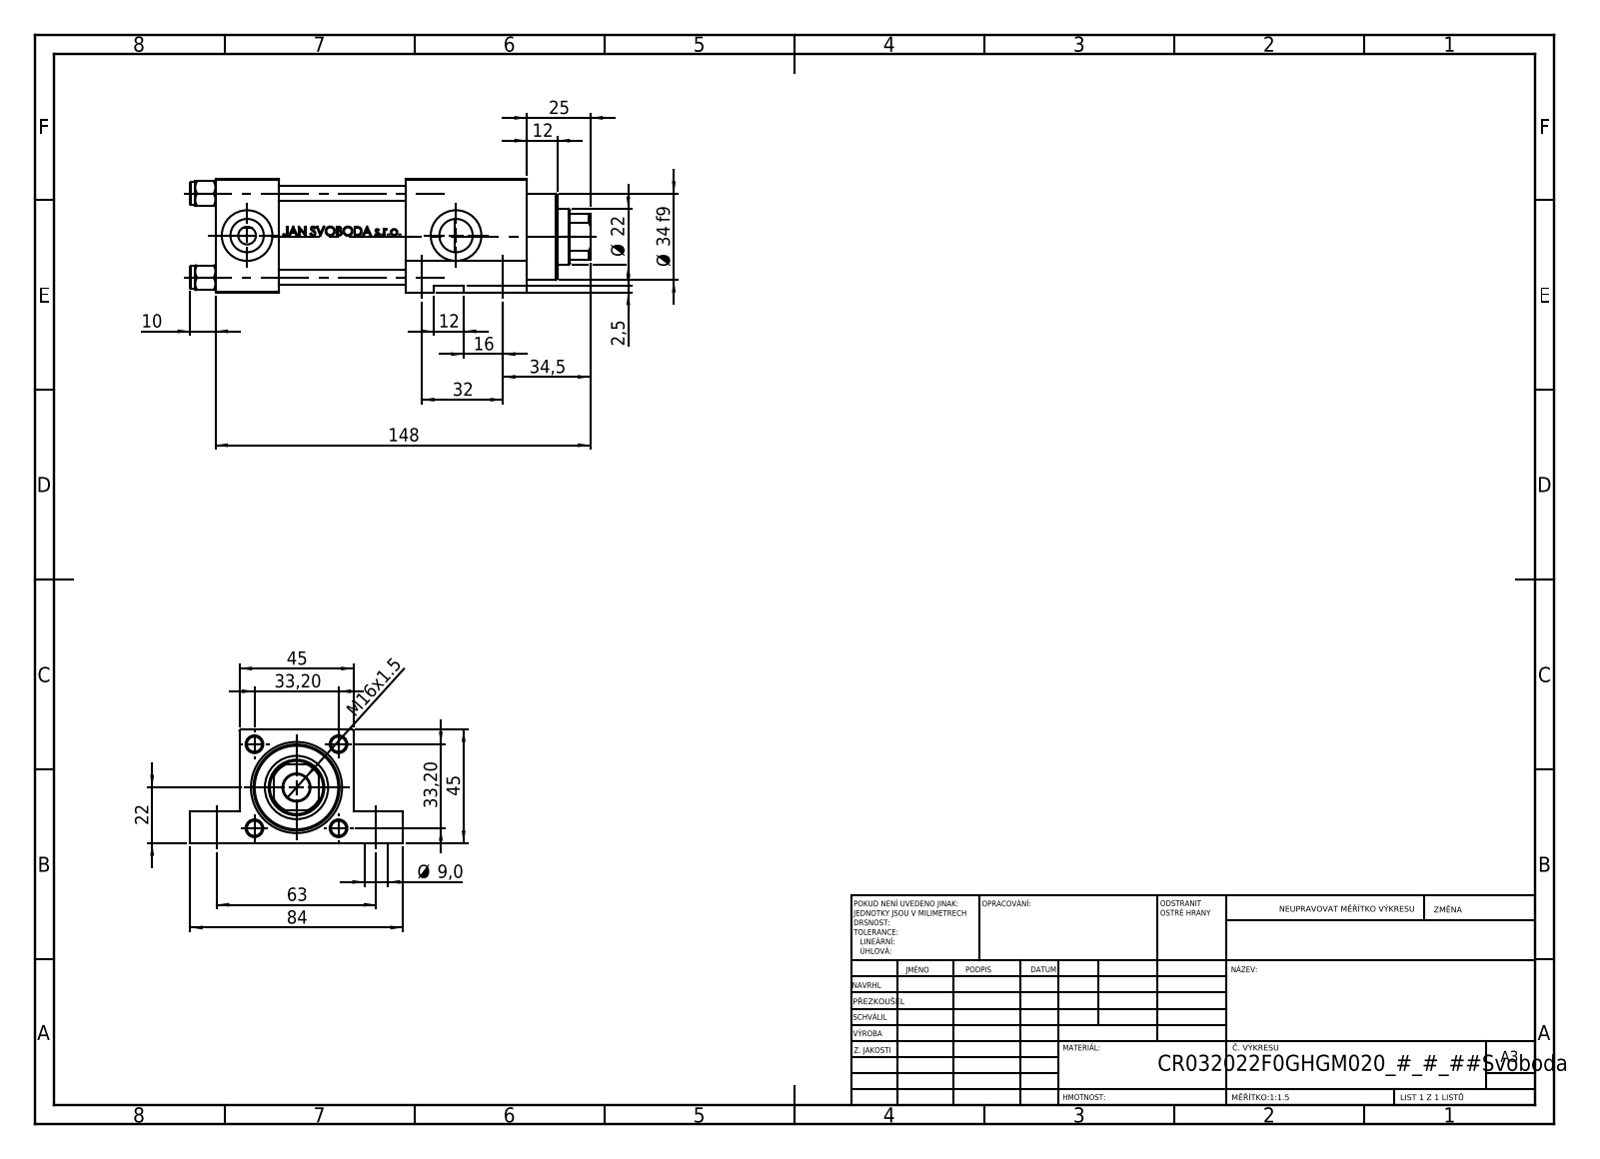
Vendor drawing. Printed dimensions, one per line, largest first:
148
84
63
45
45
34,5
Ø 34 f9
33,20
33,20
32
25
Ø 22
22
16
M16x1.5
12
12
10
Ø 9,0
2,5
